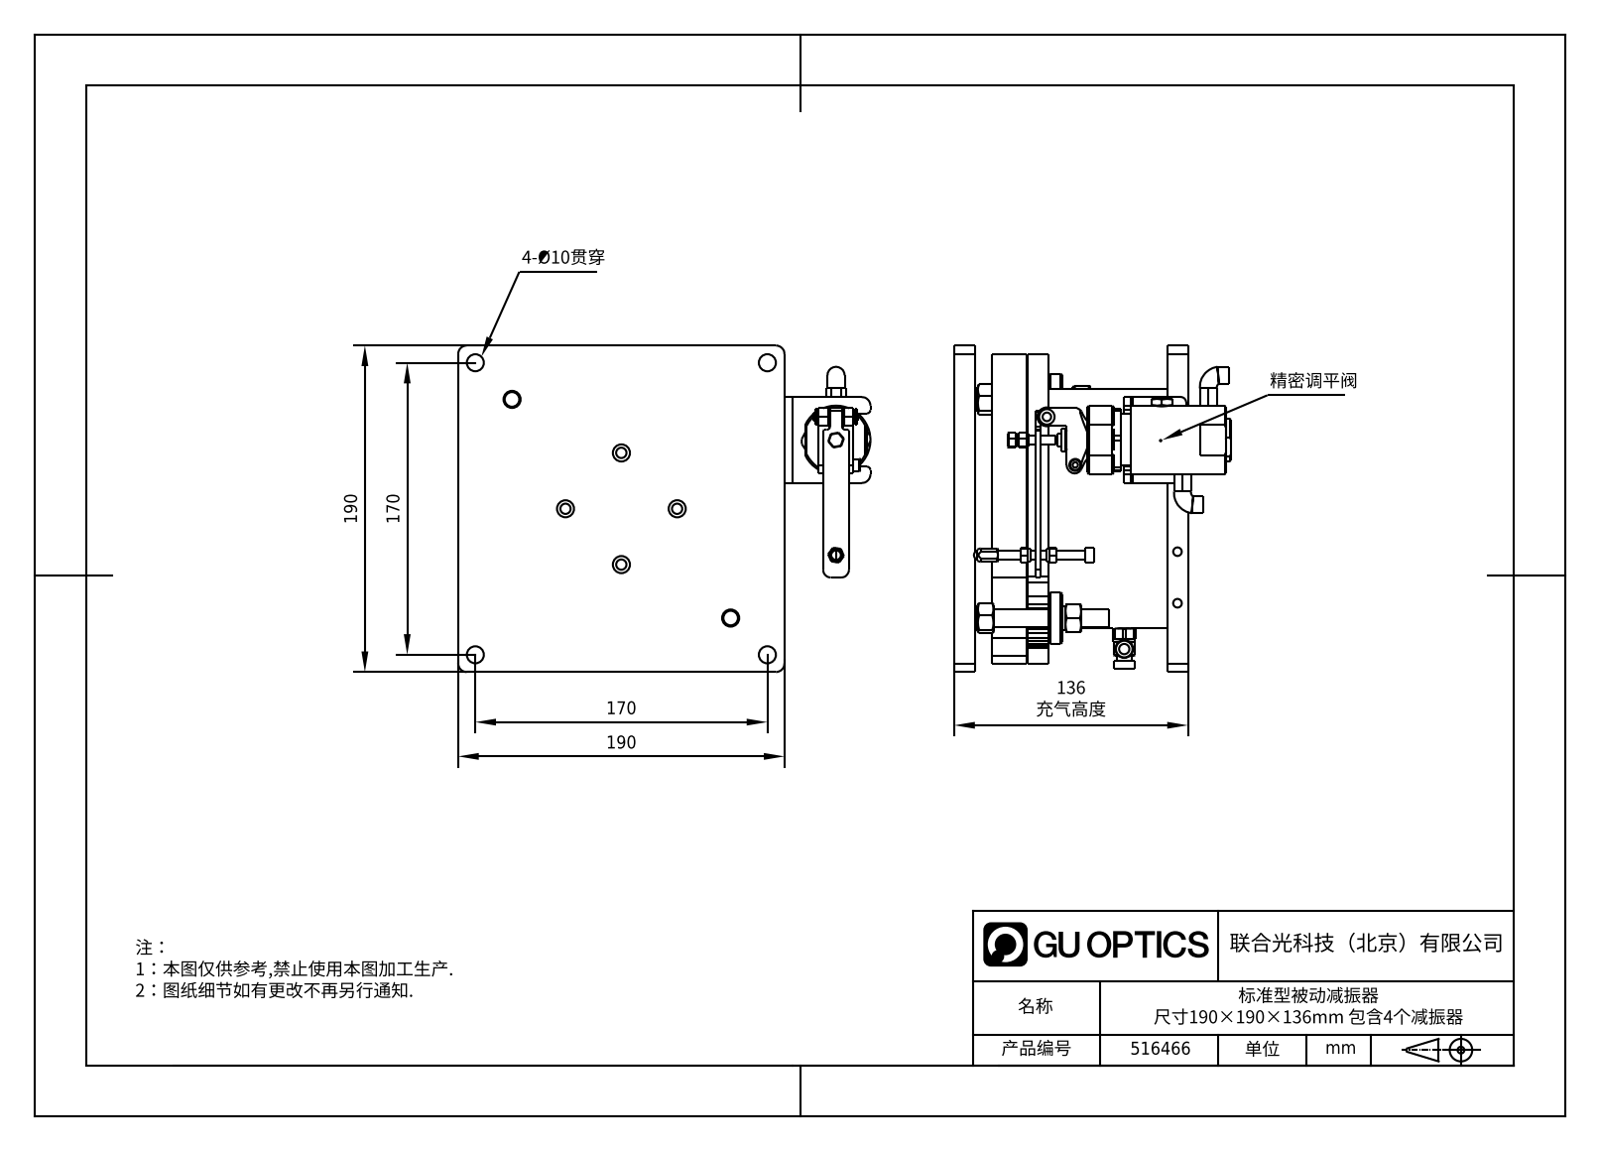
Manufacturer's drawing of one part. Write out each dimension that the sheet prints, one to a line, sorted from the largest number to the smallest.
190
190
170
170
136 充气高度
